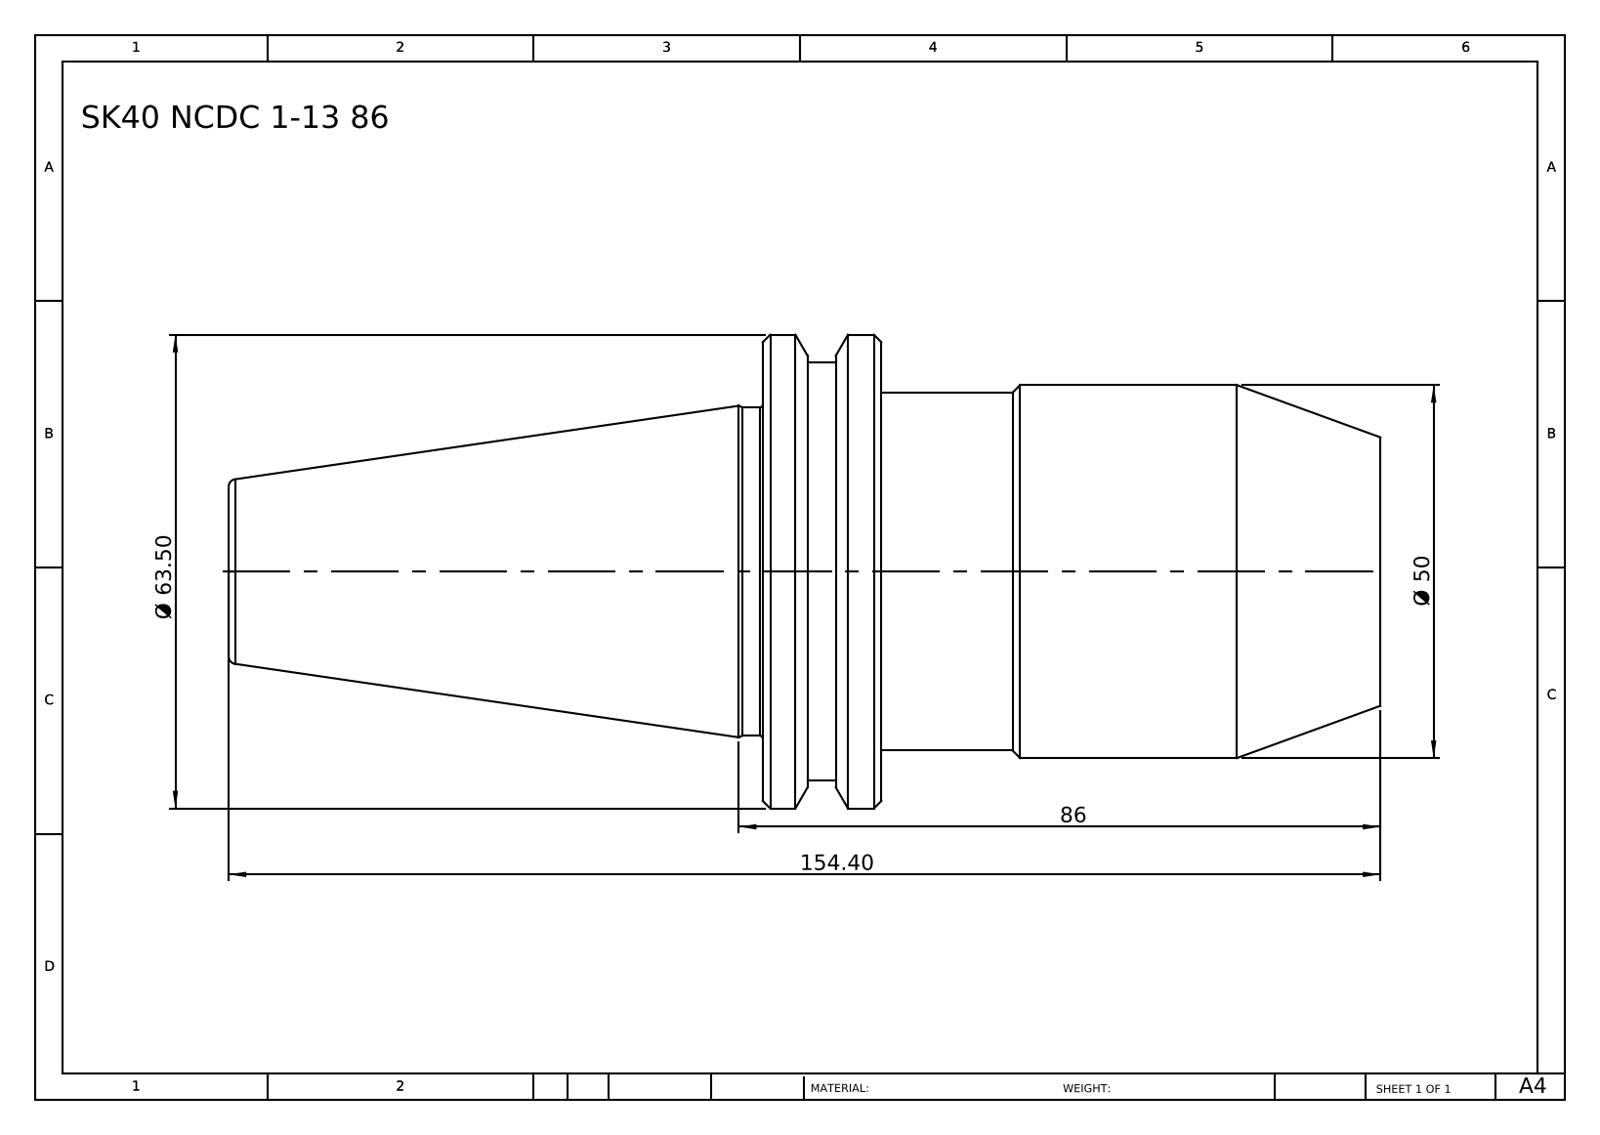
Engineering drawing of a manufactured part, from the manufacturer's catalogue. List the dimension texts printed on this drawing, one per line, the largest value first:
154.40
86
Ø 63.50
Ø 50
